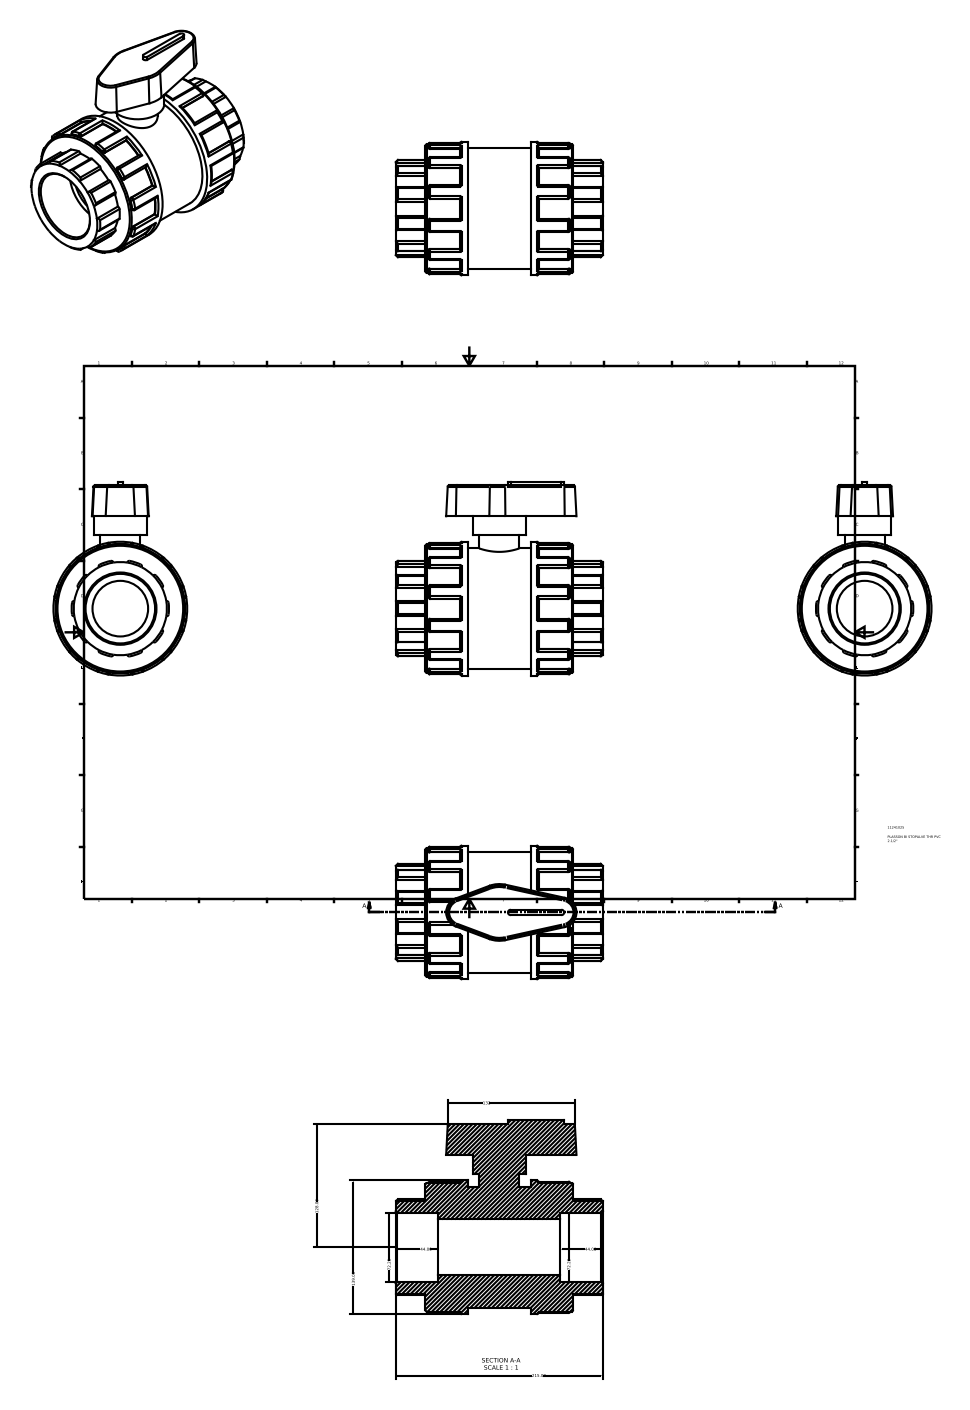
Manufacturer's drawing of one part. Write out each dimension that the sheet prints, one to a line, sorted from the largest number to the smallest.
215.00
139.00
132
128.00
72.23
72.23
44.00
44.00
